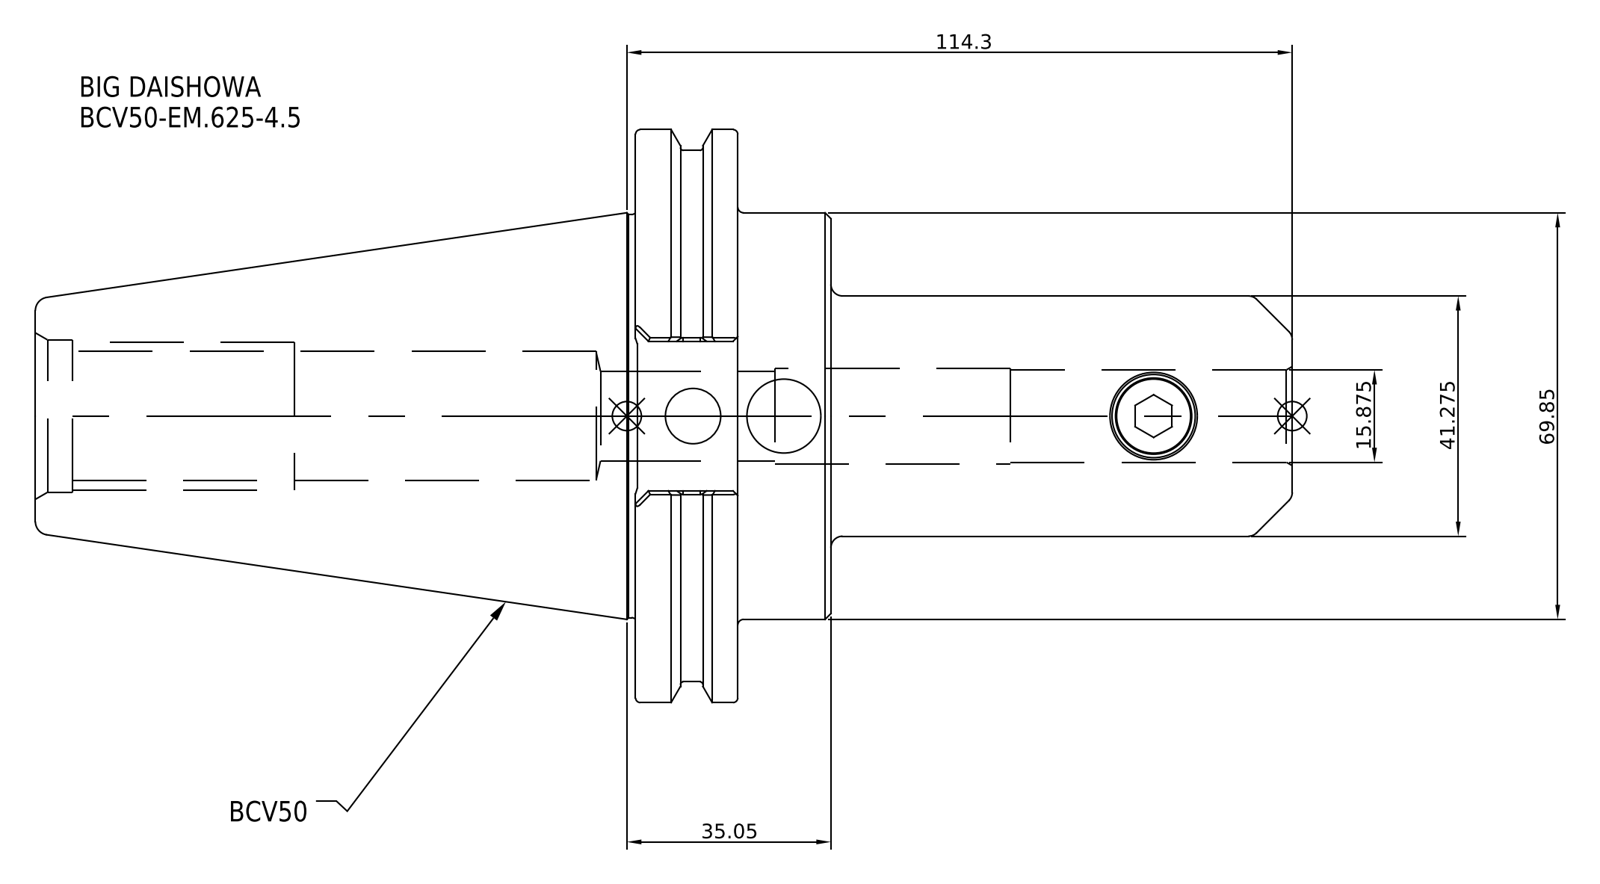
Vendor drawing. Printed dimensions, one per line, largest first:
114.3
69.85
41.275
35.05
15.875
